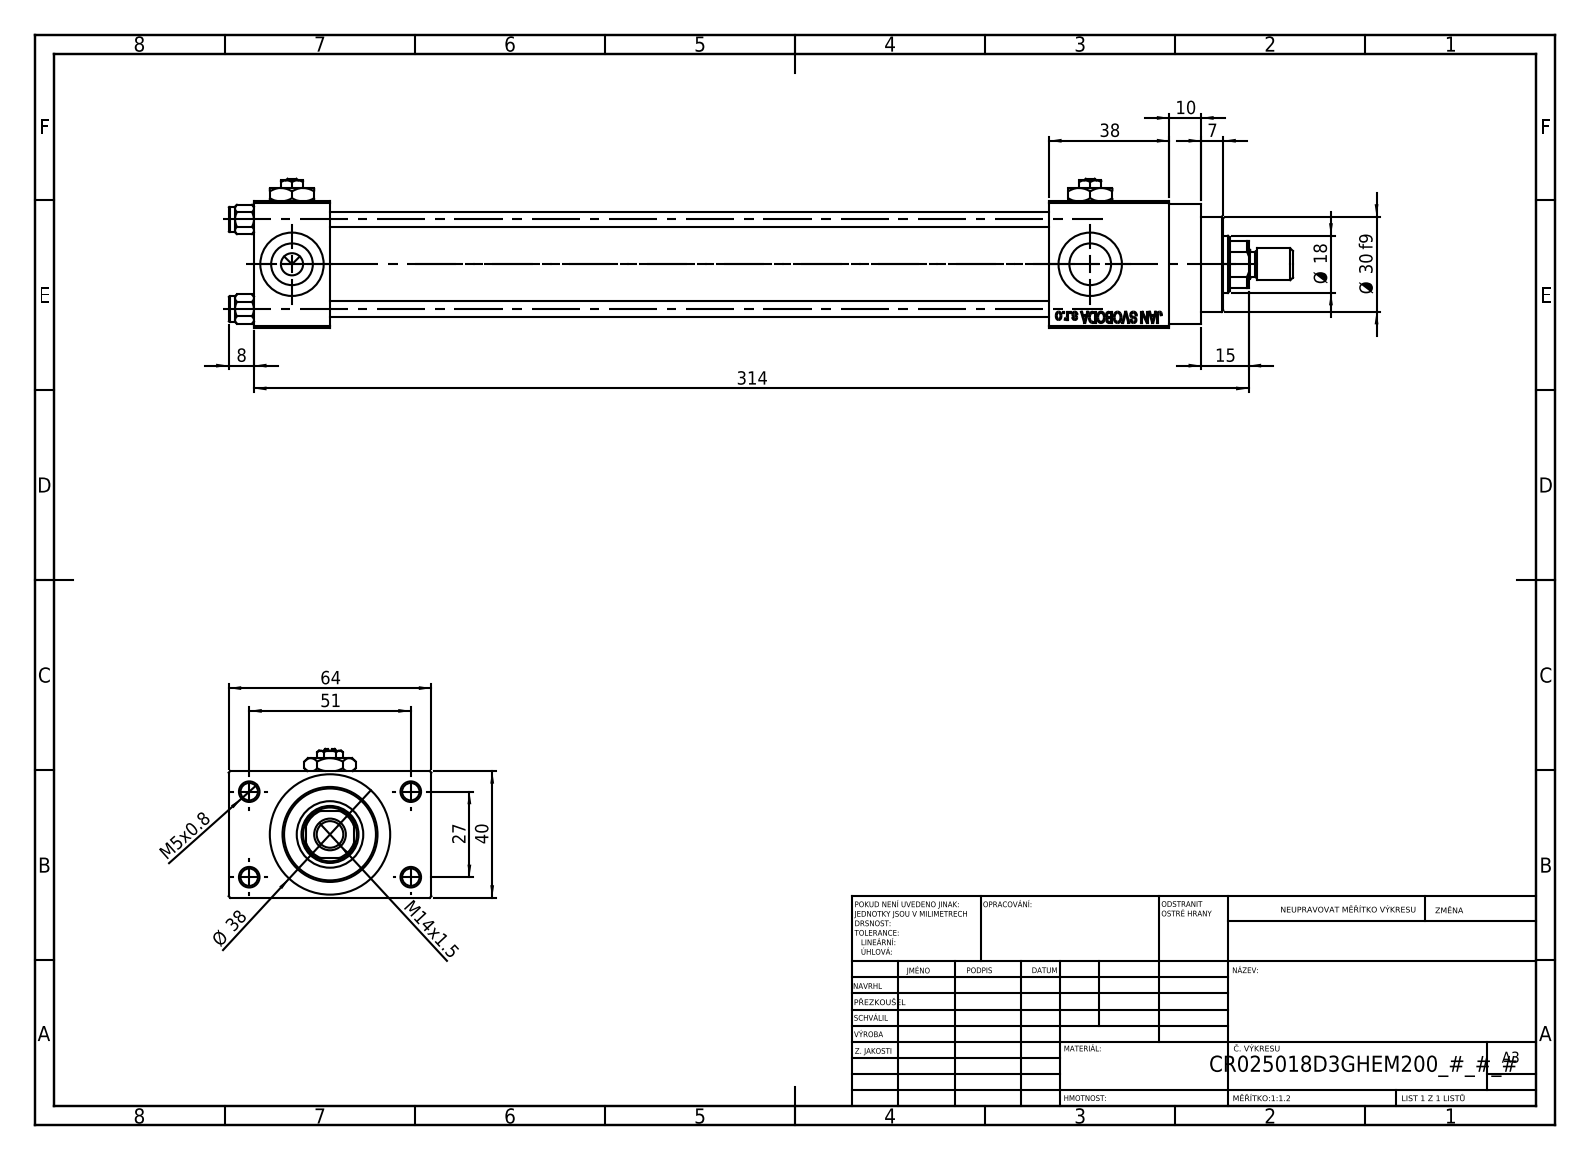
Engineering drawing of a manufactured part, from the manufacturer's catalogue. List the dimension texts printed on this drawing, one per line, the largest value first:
314
64
51
40
38
Ø 38
Ø 30 f9
27
Ø 18
15
M14x1.5
10
8
7
M5x0.8
